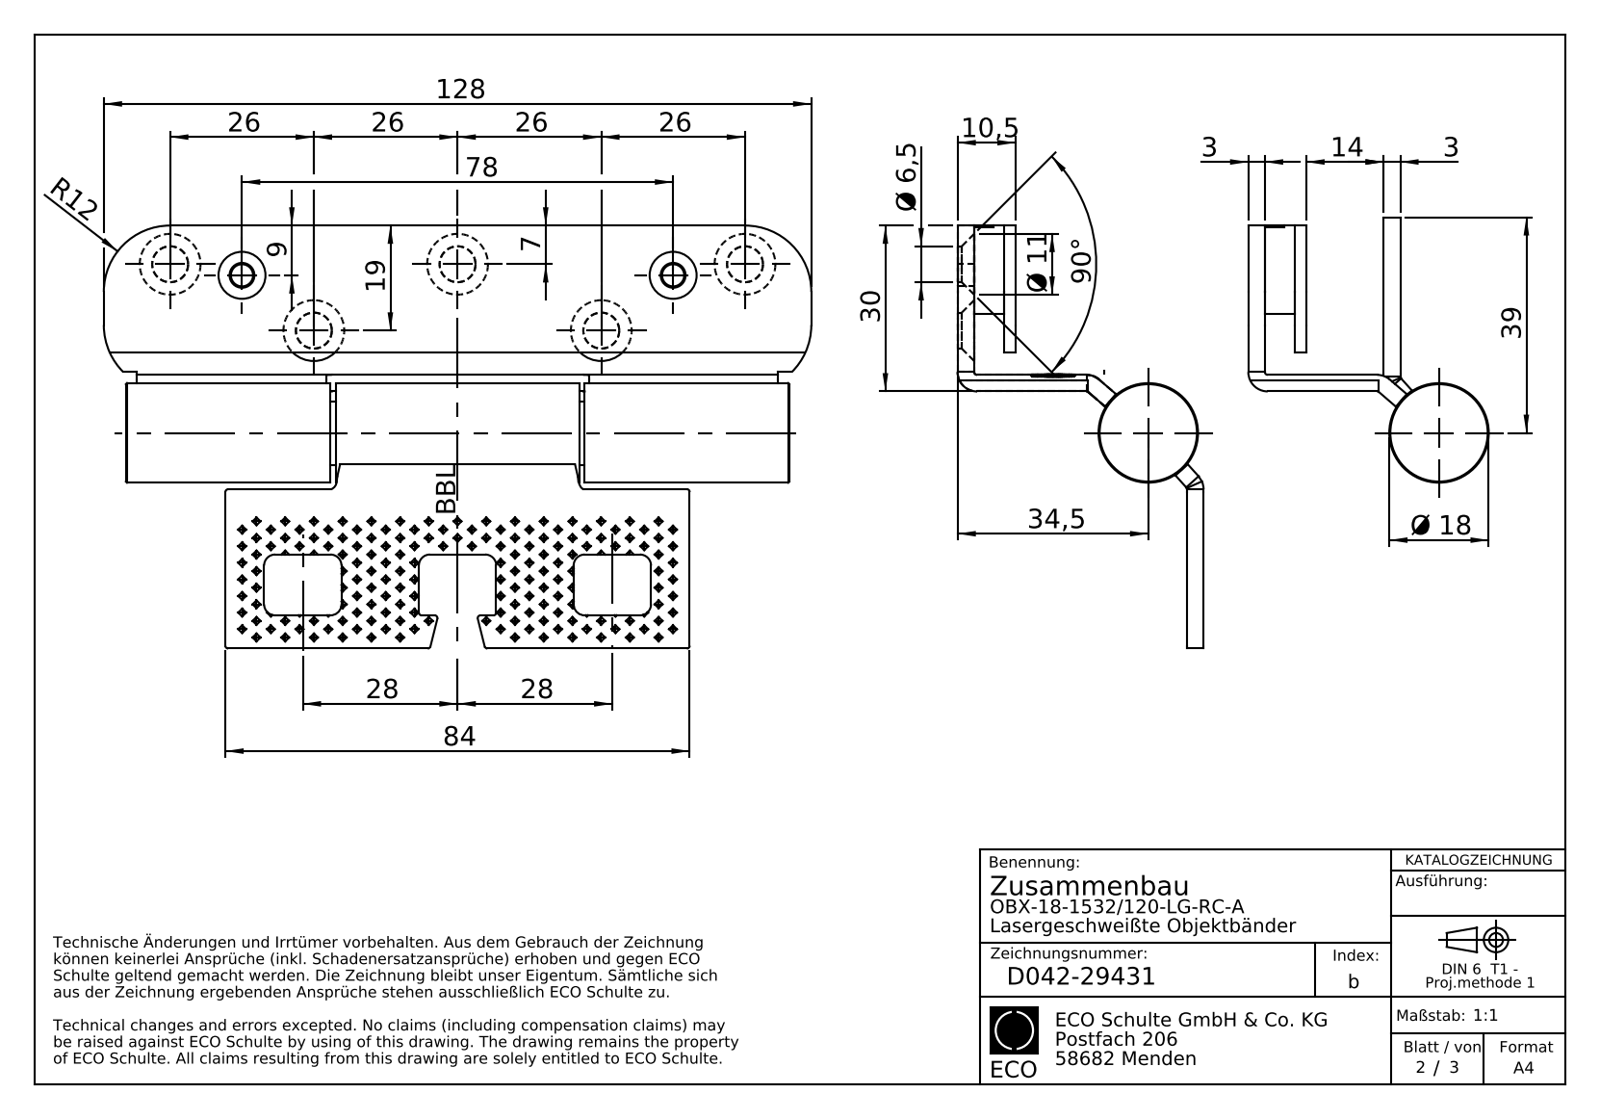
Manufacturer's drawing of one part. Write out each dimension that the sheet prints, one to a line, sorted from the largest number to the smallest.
128
90°
84
78
39
34,5
30
28
28
26
26
26
26
19
Ø 18
14
R12
Ø 11
10,5
9
7
Ø 6,5
3
3
